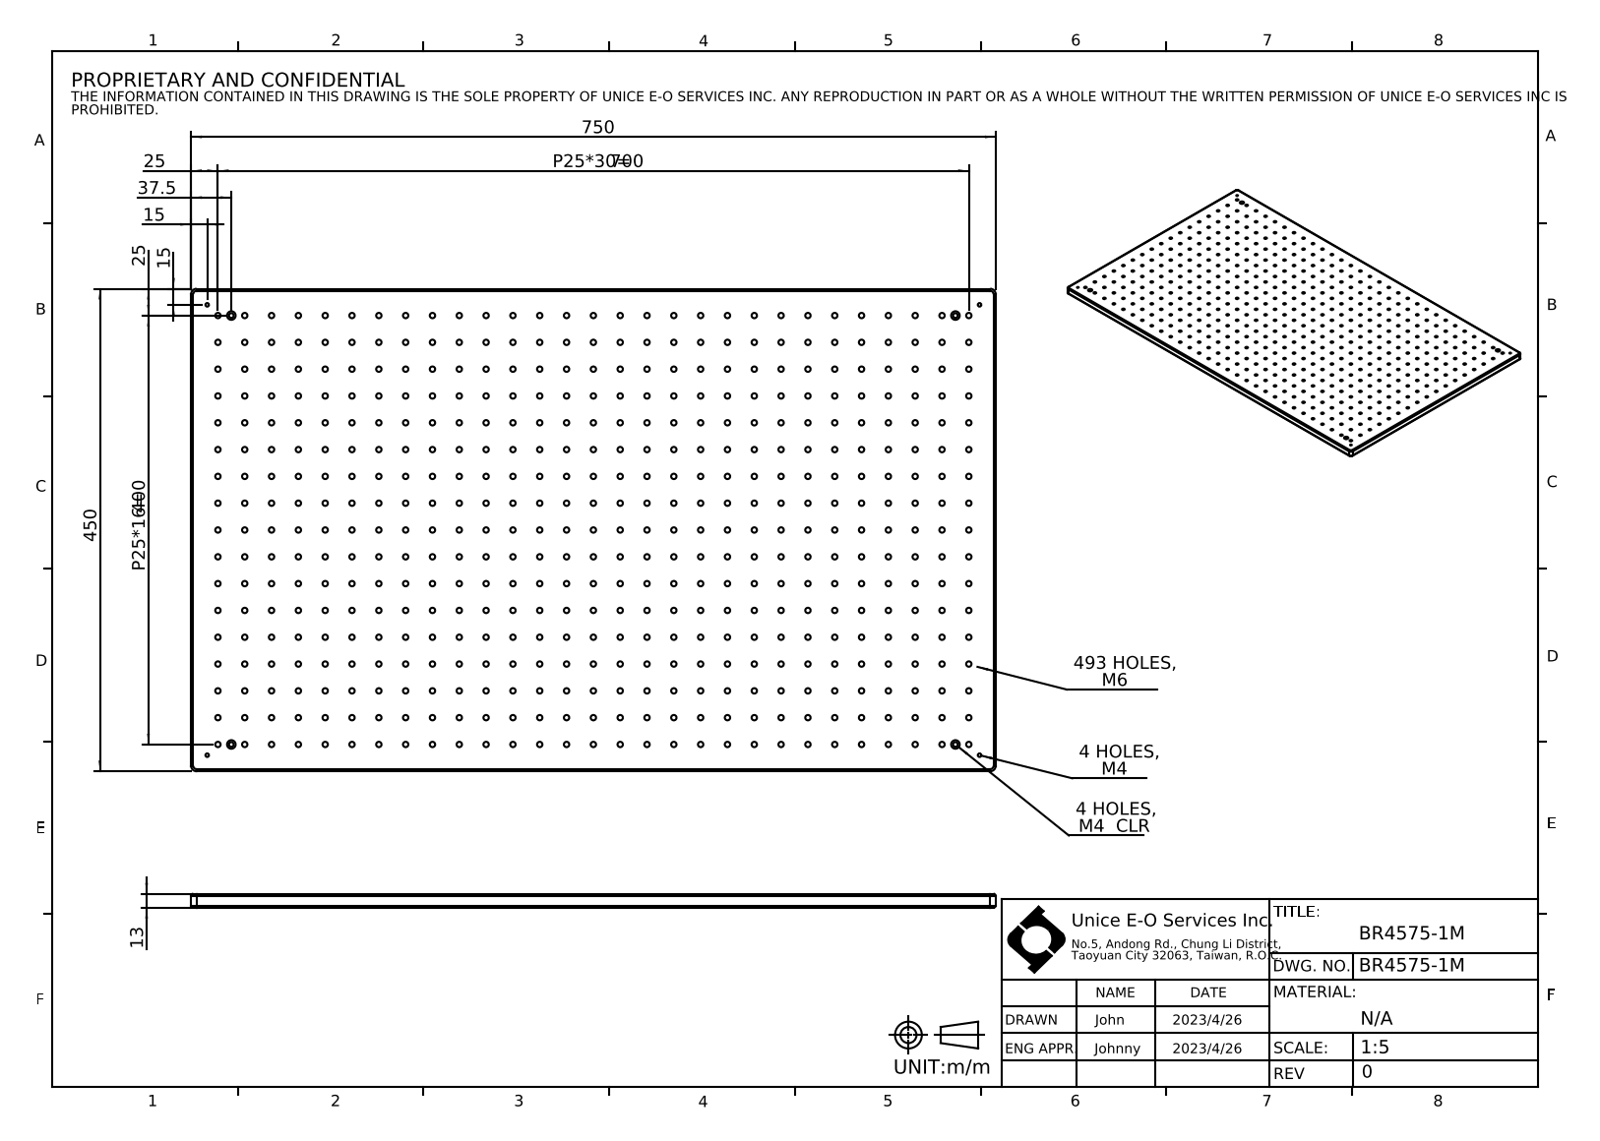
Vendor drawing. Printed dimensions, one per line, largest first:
750
493 HOLES, M6
450
37.5
25
25
P25*30= 700
P25*16= 400
15
15
13
4 HOLES, M4
